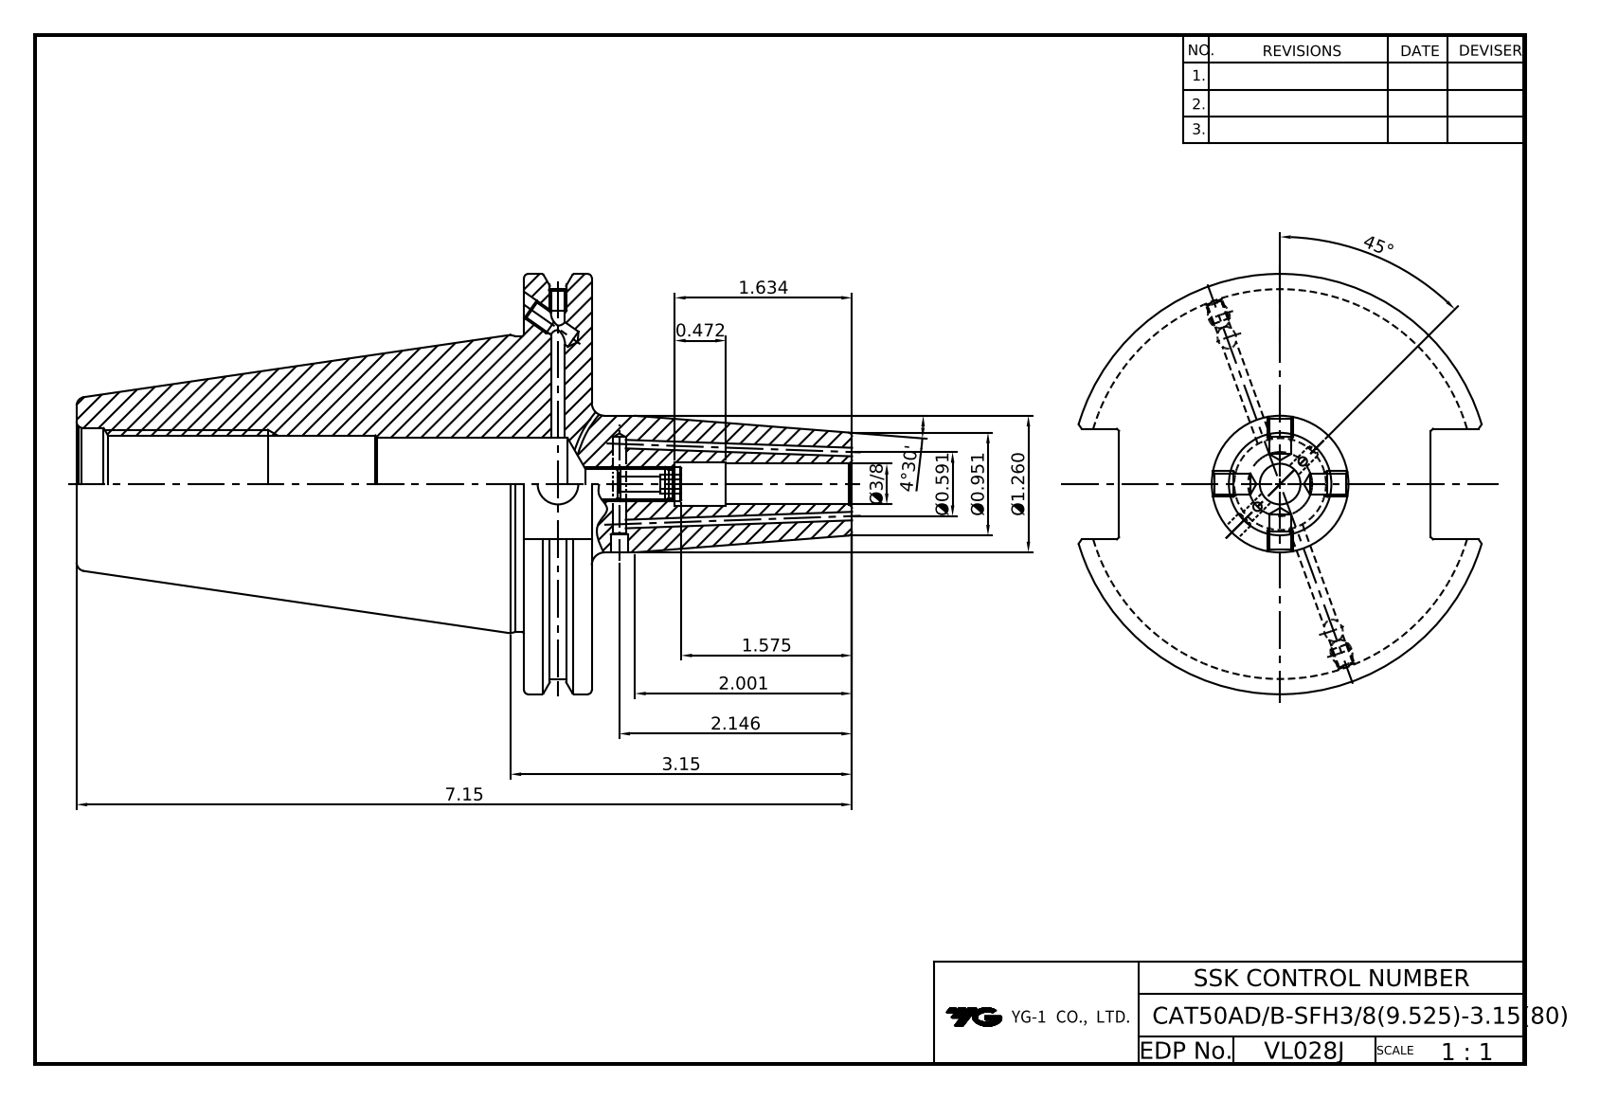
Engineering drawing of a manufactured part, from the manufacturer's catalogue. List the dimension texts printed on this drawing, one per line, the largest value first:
45°
7.15
4°30'
3.15
2.146
2.001
1.634
1.575
Ø1.260
Ø0.951
Ø0.591
0.472
Ø3/8
